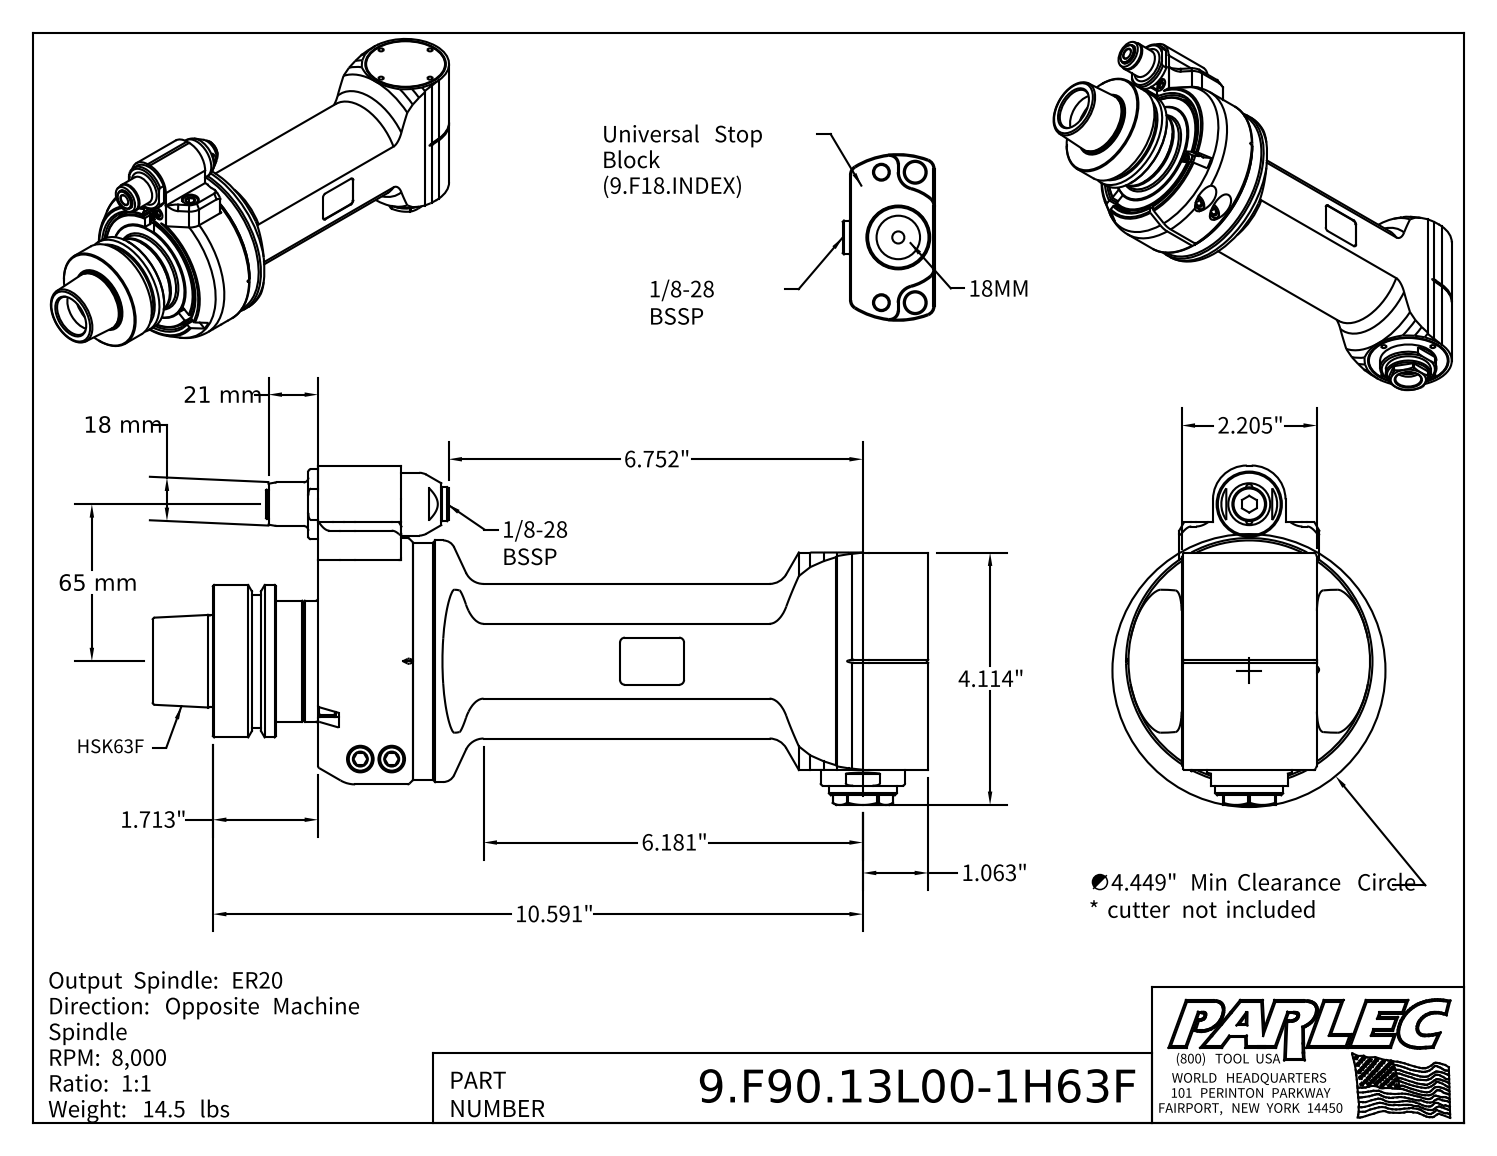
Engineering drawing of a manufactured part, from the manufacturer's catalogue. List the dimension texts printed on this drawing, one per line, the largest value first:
65 mm
21 mm
18 mm
10.591"
6.752"
6.181"
∅4.449" Min Clearance Circle * cutter not included
4.114"
2.205"
1.713"
1.063"
